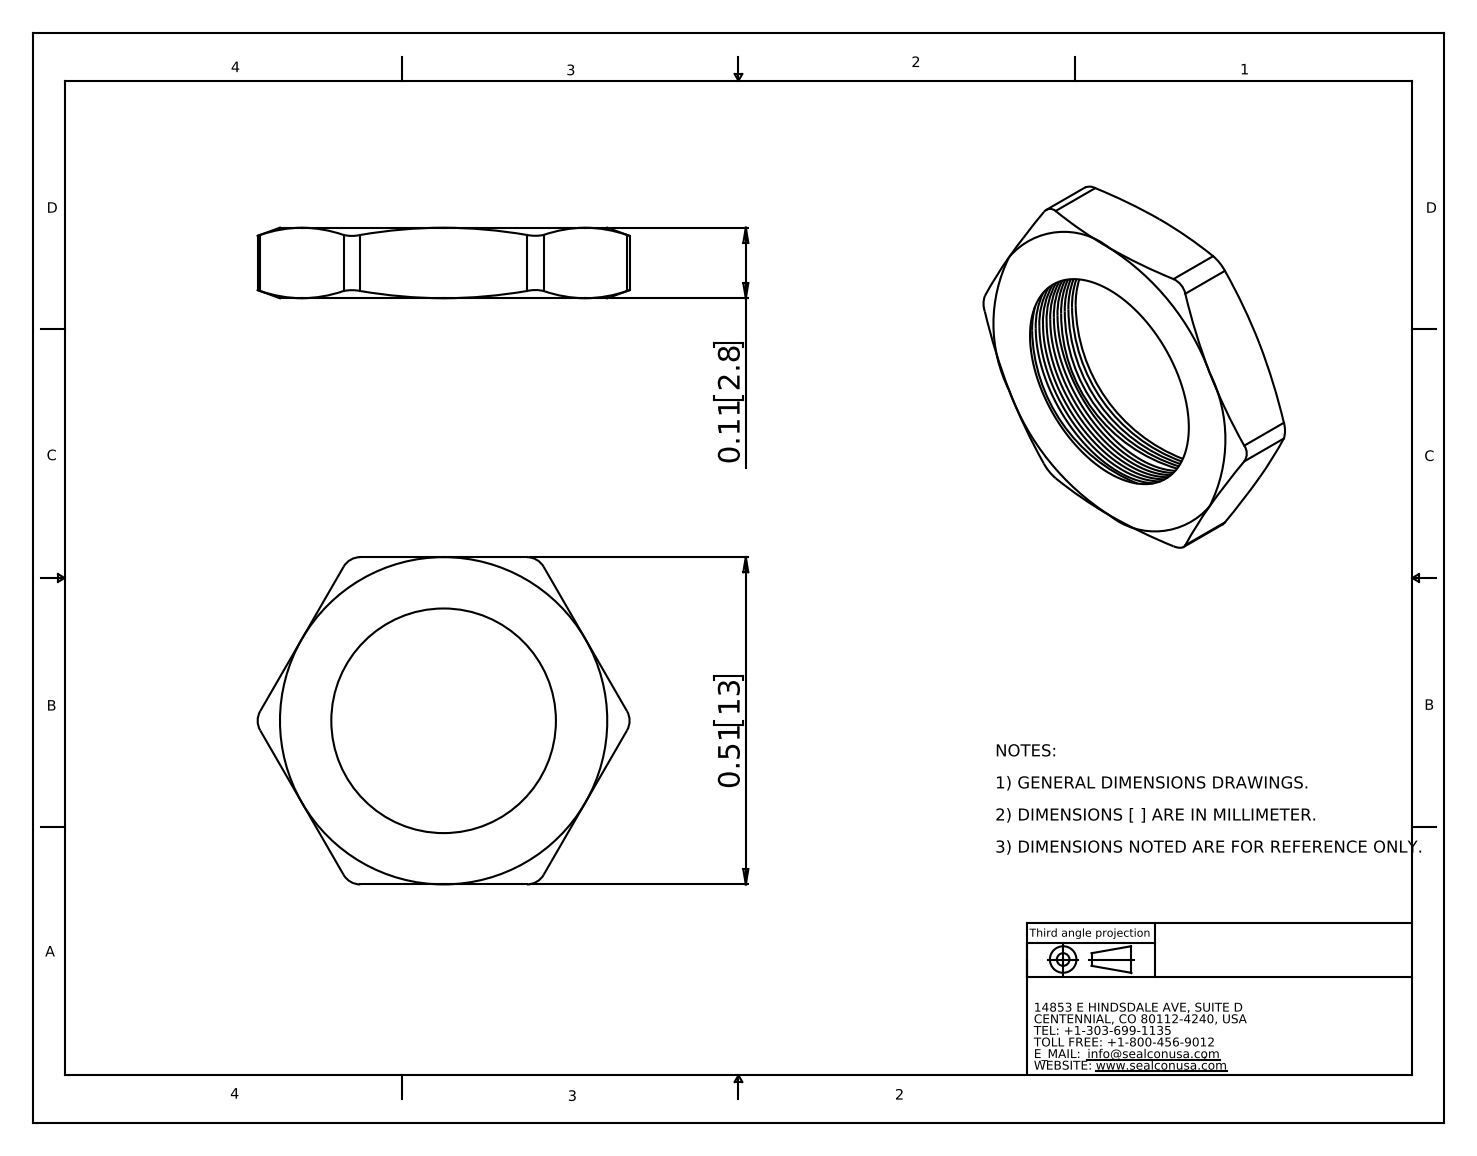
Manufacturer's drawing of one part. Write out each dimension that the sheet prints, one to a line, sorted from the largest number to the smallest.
0.51 13
0.11 2.8
